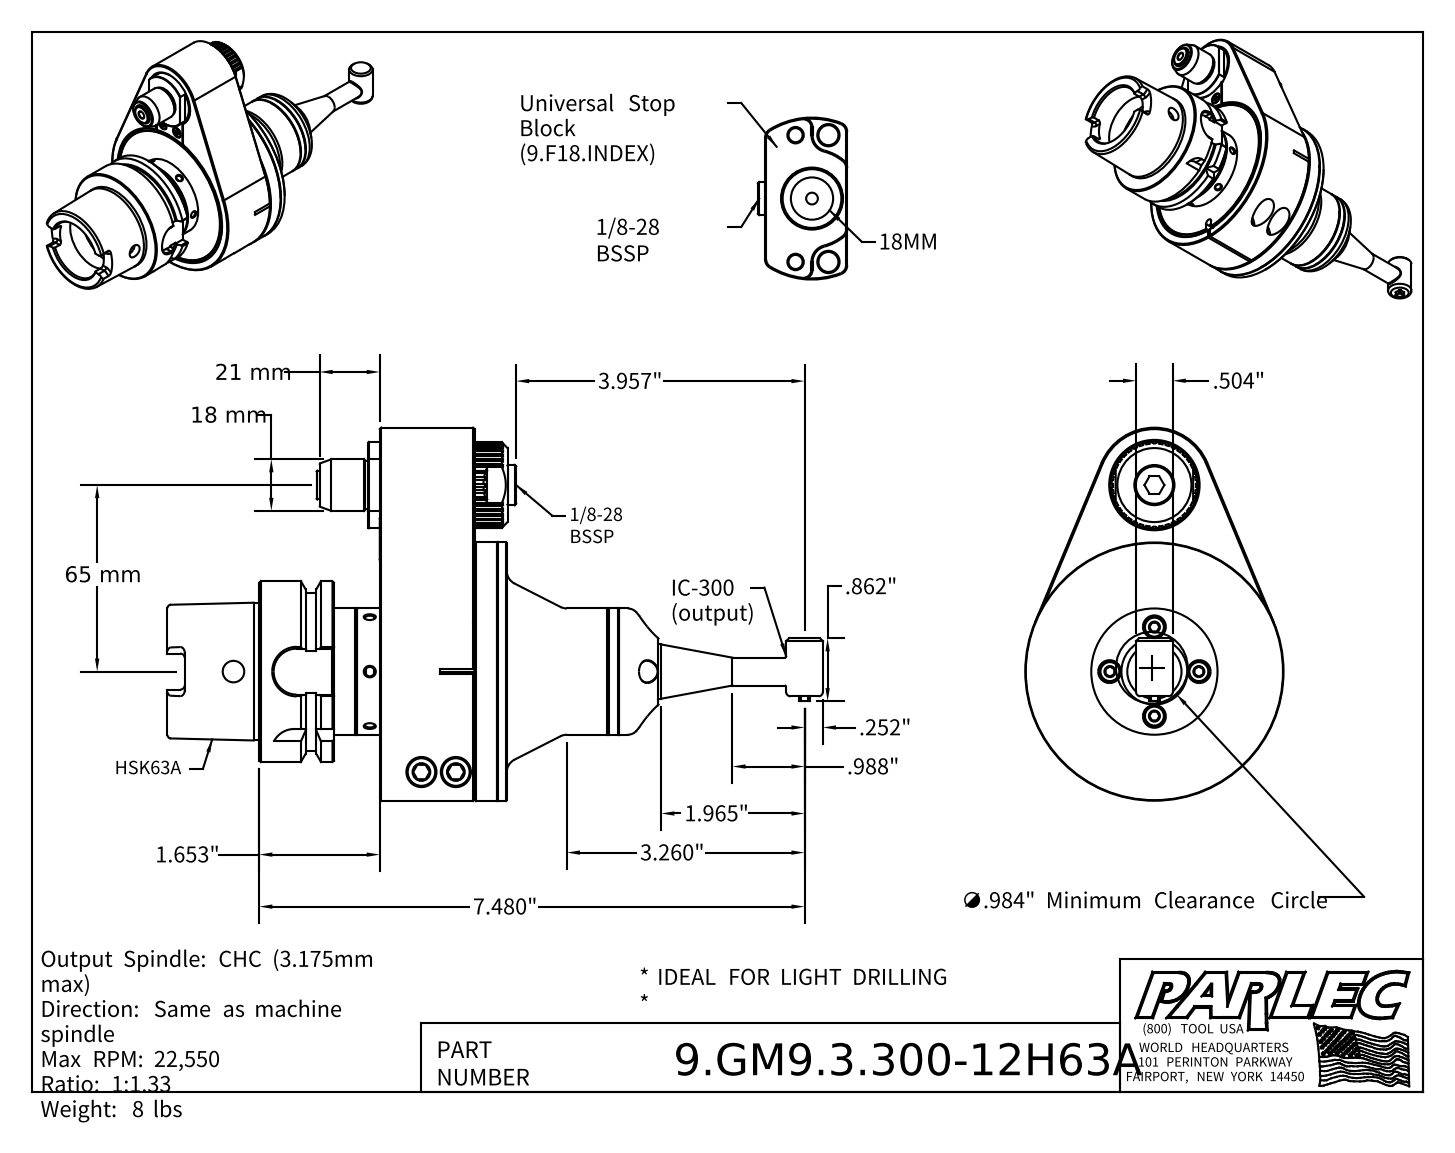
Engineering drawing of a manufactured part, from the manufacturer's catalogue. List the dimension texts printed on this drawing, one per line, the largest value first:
65 mm
21 mm
18 mm
7.480"
3.957"
3.260"
1.965"
1.653"
.988"
∅.984" Minimum Clearance Circle
.862"
.504"
.252"
